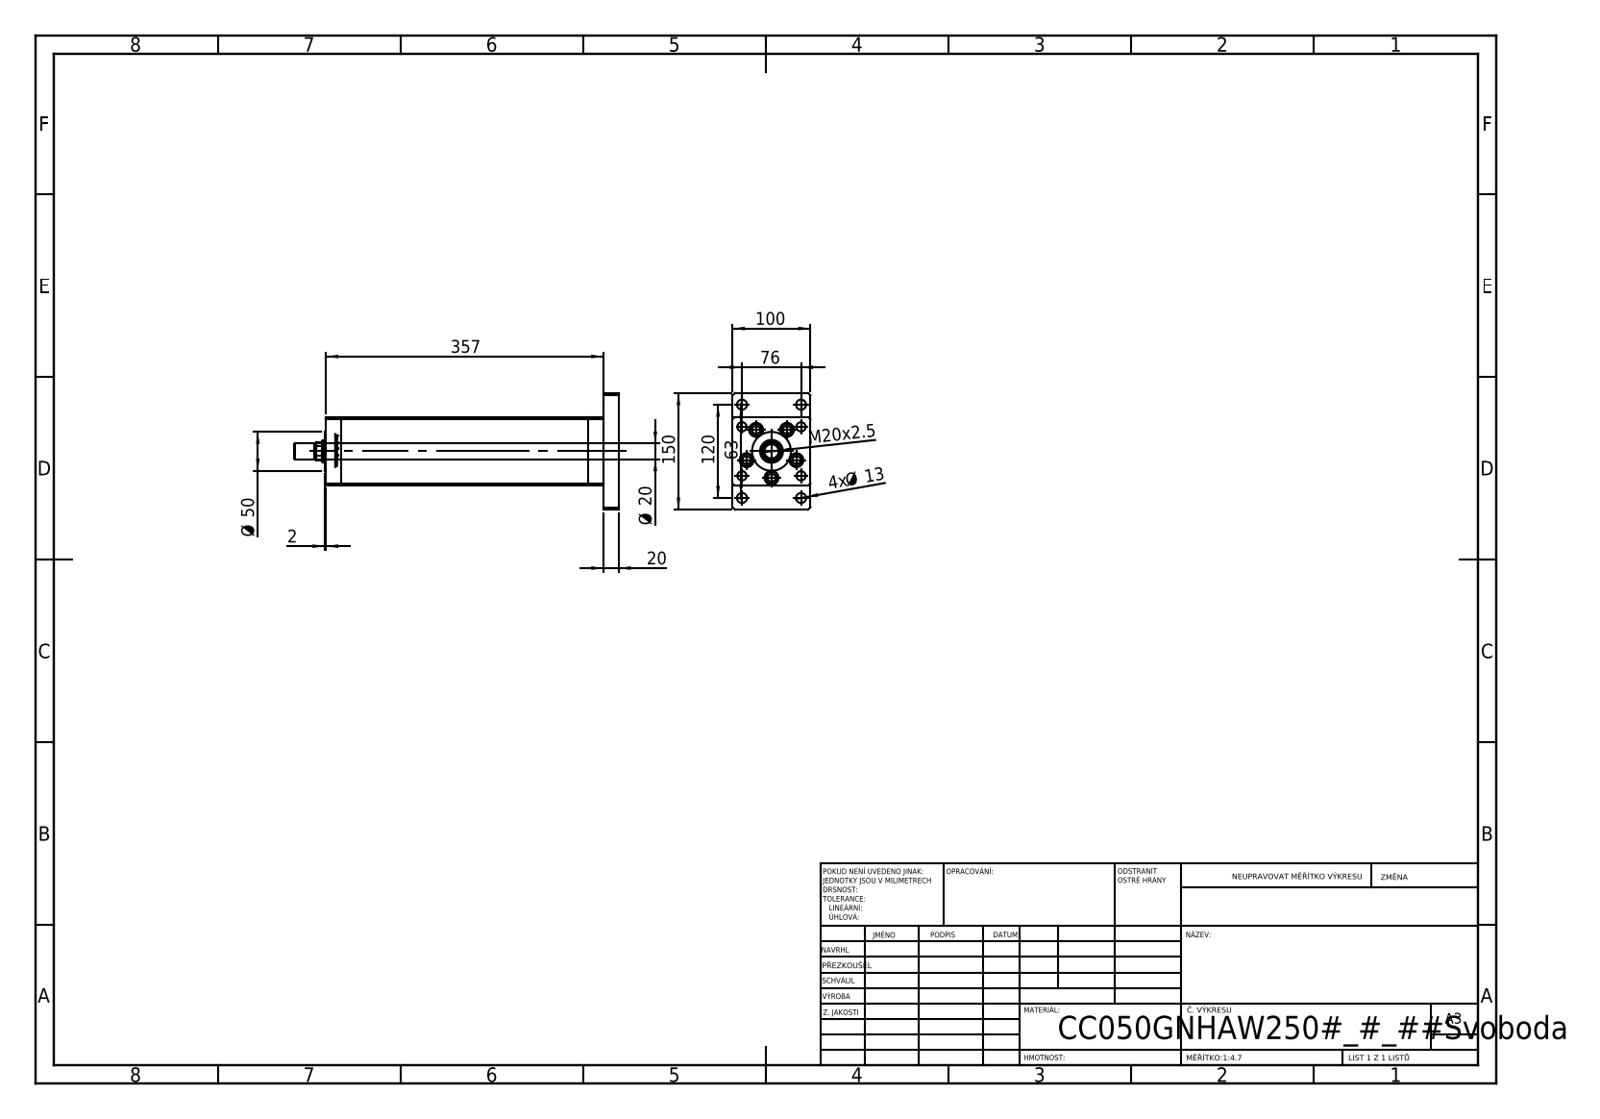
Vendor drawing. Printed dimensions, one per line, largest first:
357
150
120
100
76
63
Ø 50
20
Ø 20
M20x2.5
4x Ø 13
2
